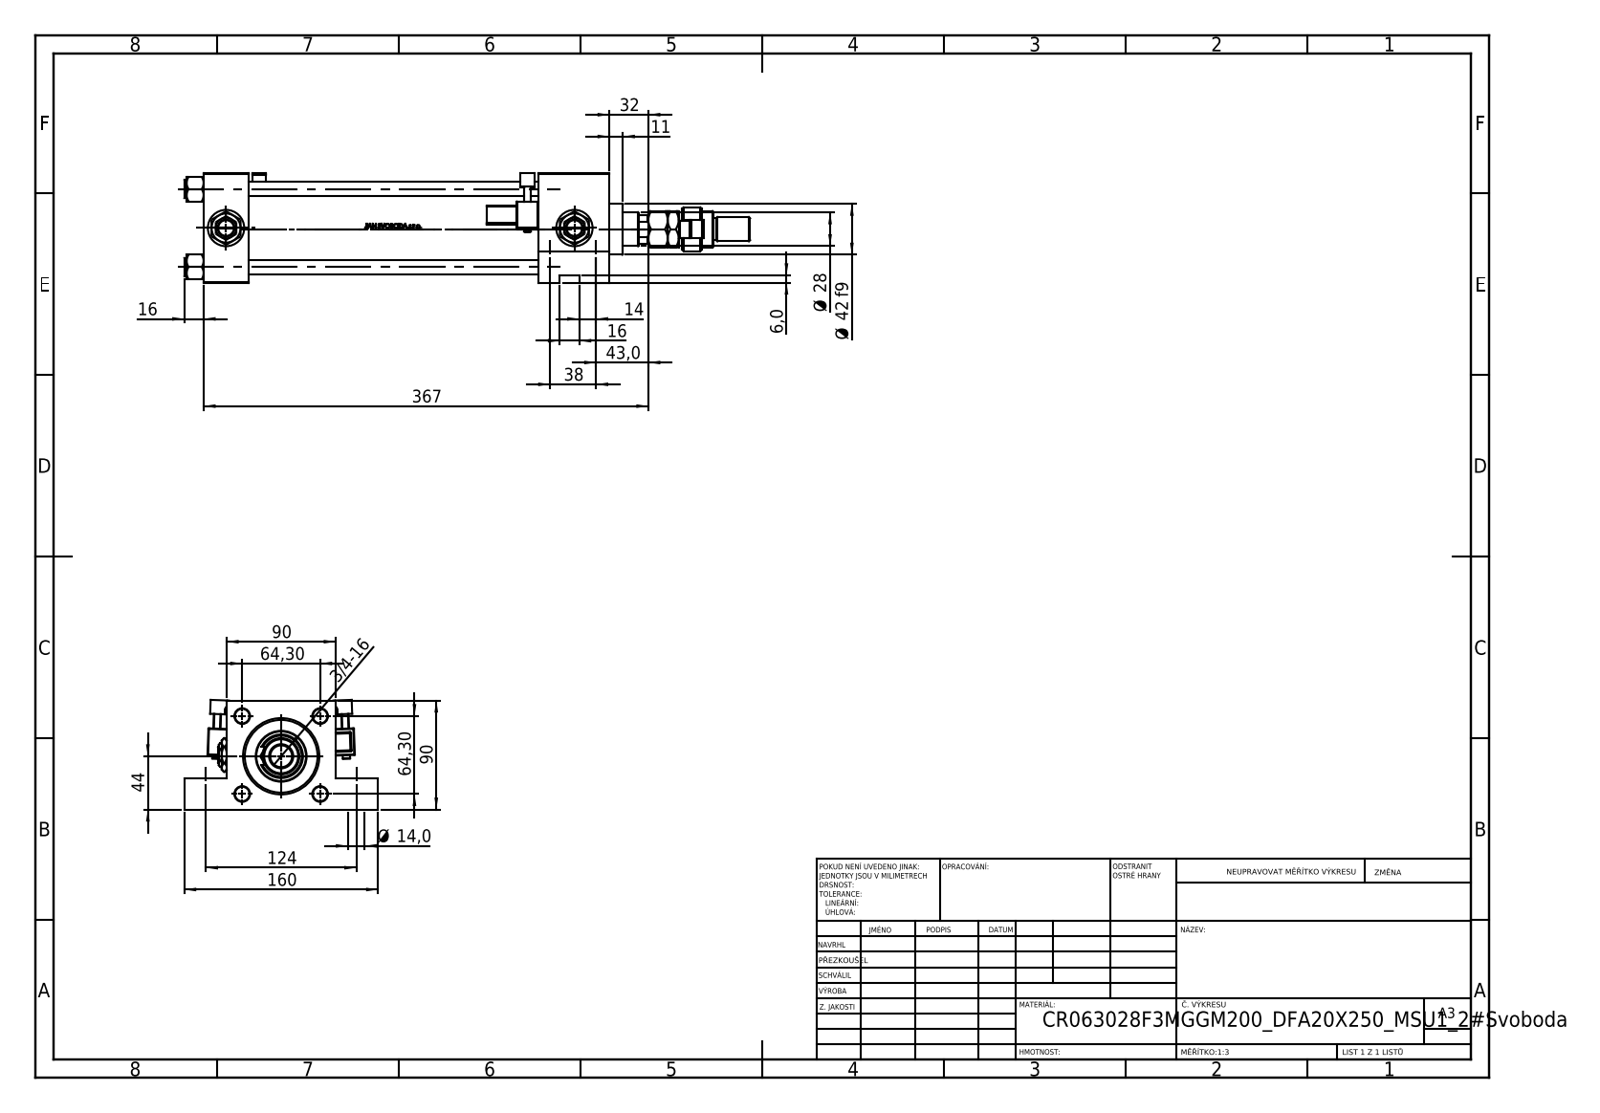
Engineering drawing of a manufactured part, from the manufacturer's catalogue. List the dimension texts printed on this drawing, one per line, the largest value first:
367
160
124
90
90
64,30
64,30
44
43,0
Ø 42 f9
38
32
Ø 28
16
16
14
Ø 14,0
11
6,0
3/4-16
